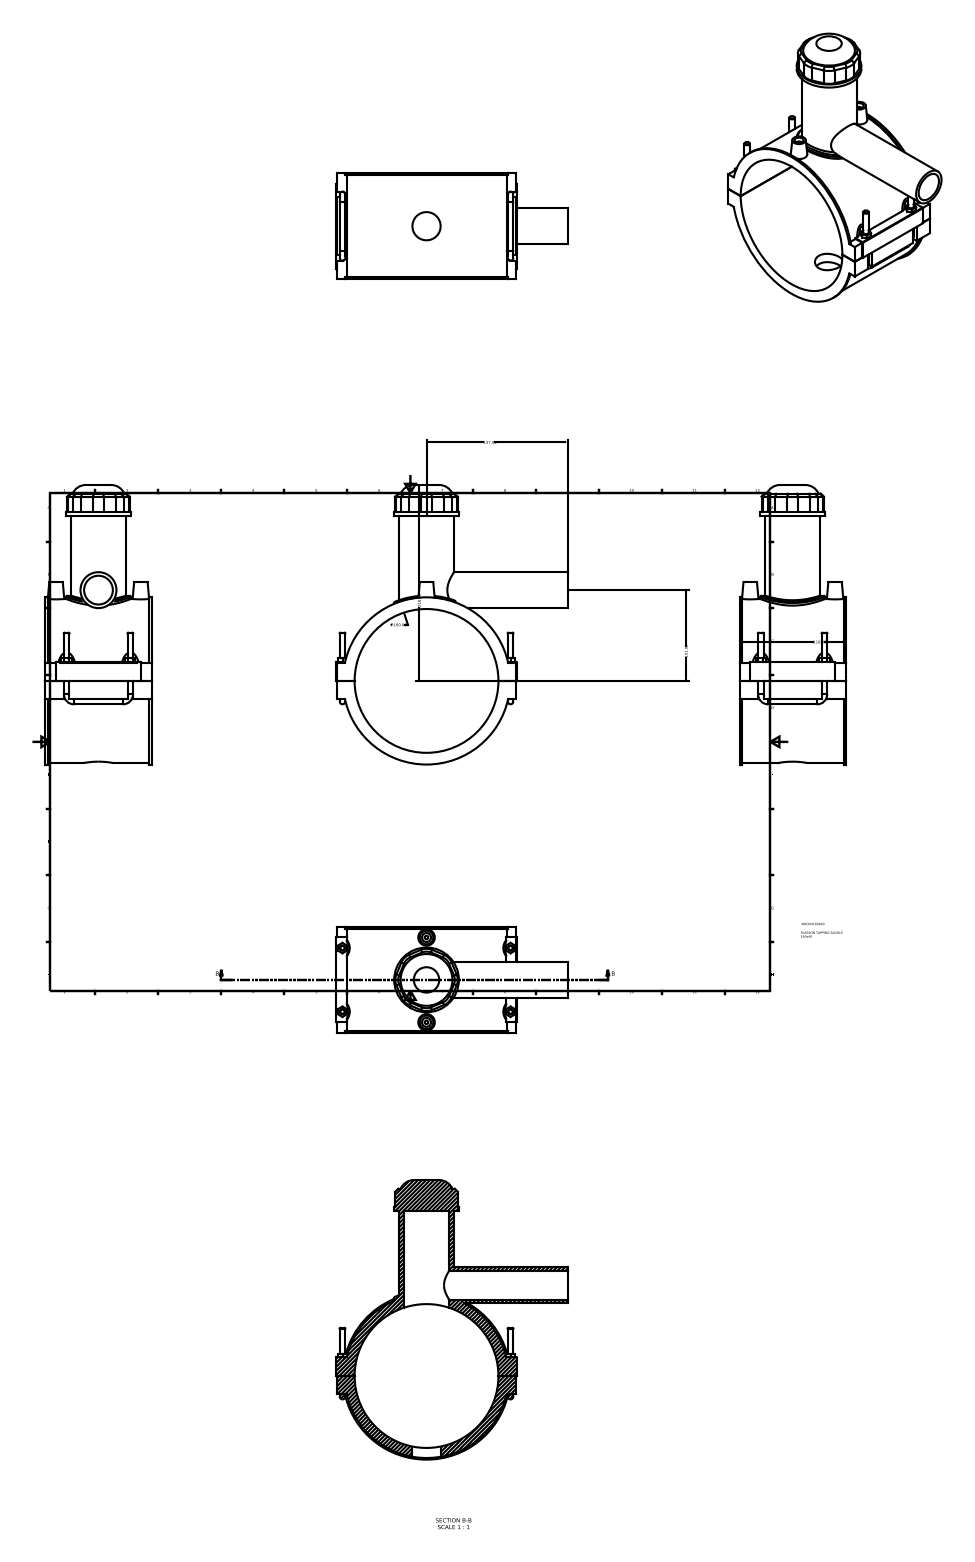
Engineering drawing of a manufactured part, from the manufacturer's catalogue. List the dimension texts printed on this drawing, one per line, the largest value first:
218.00
∅160.00
157.00
118.00
101.00
